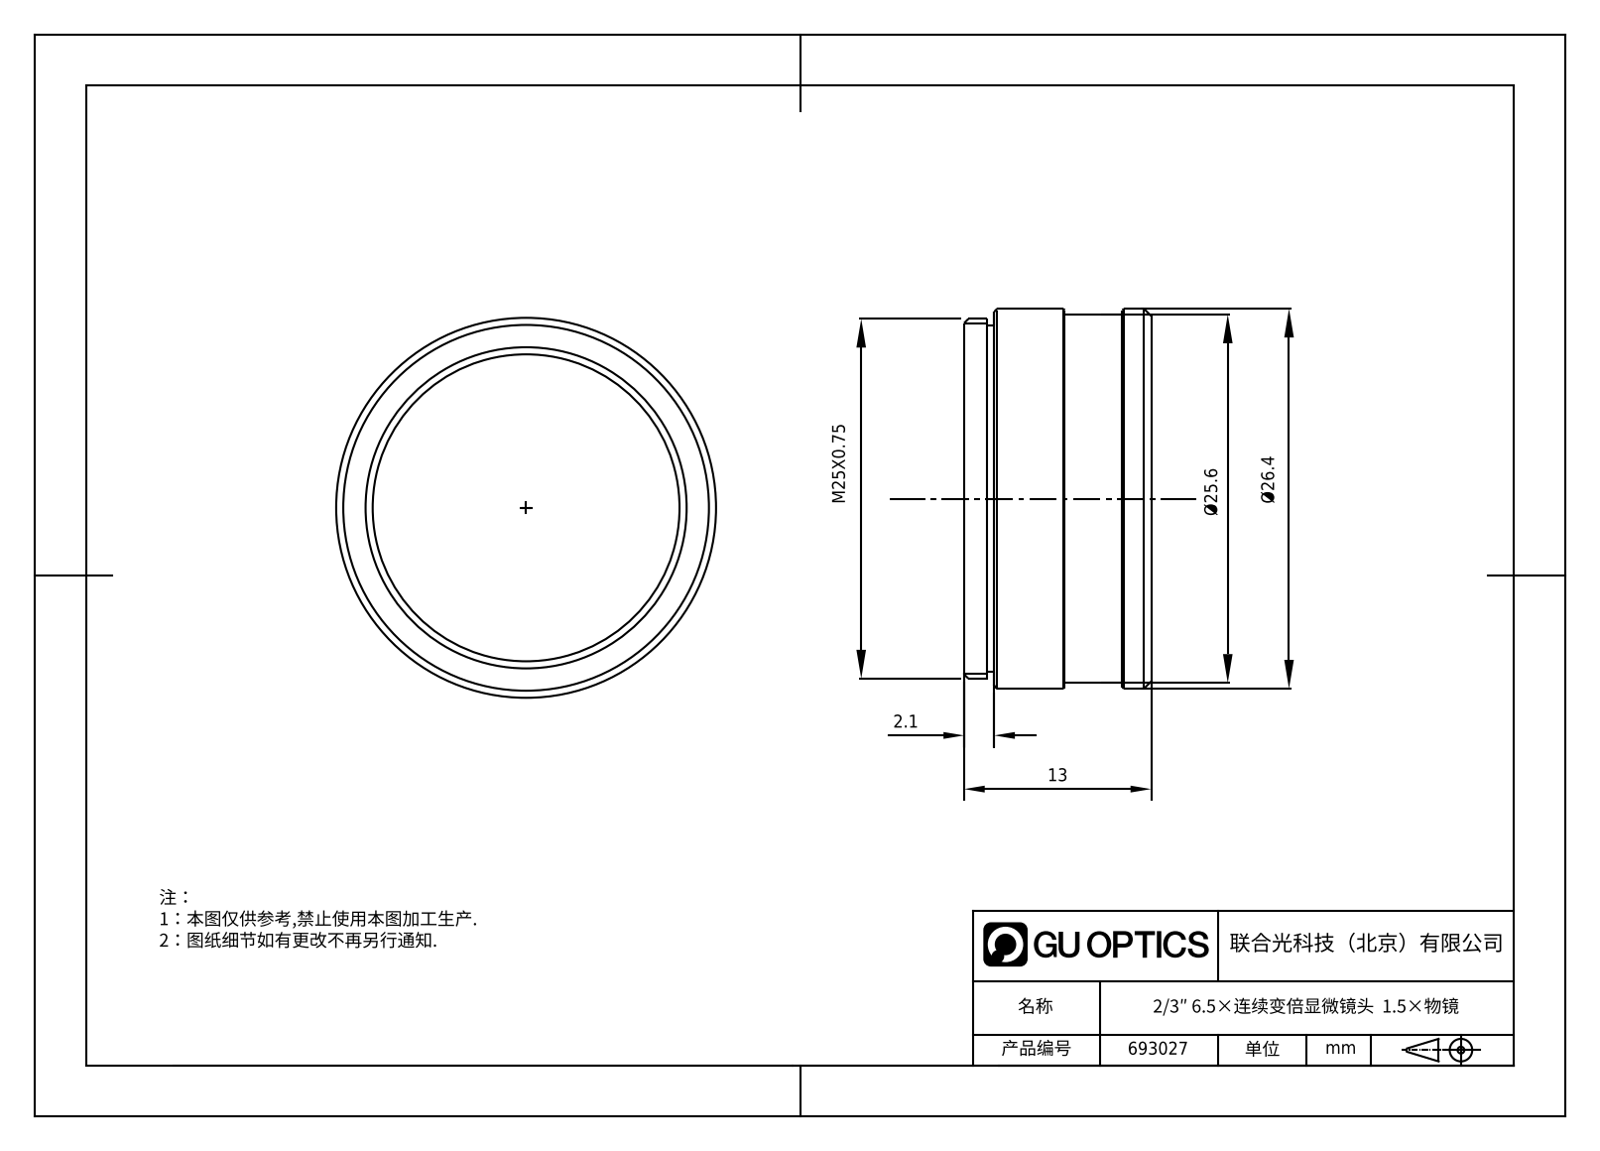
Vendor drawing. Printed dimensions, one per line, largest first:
13
2.1
